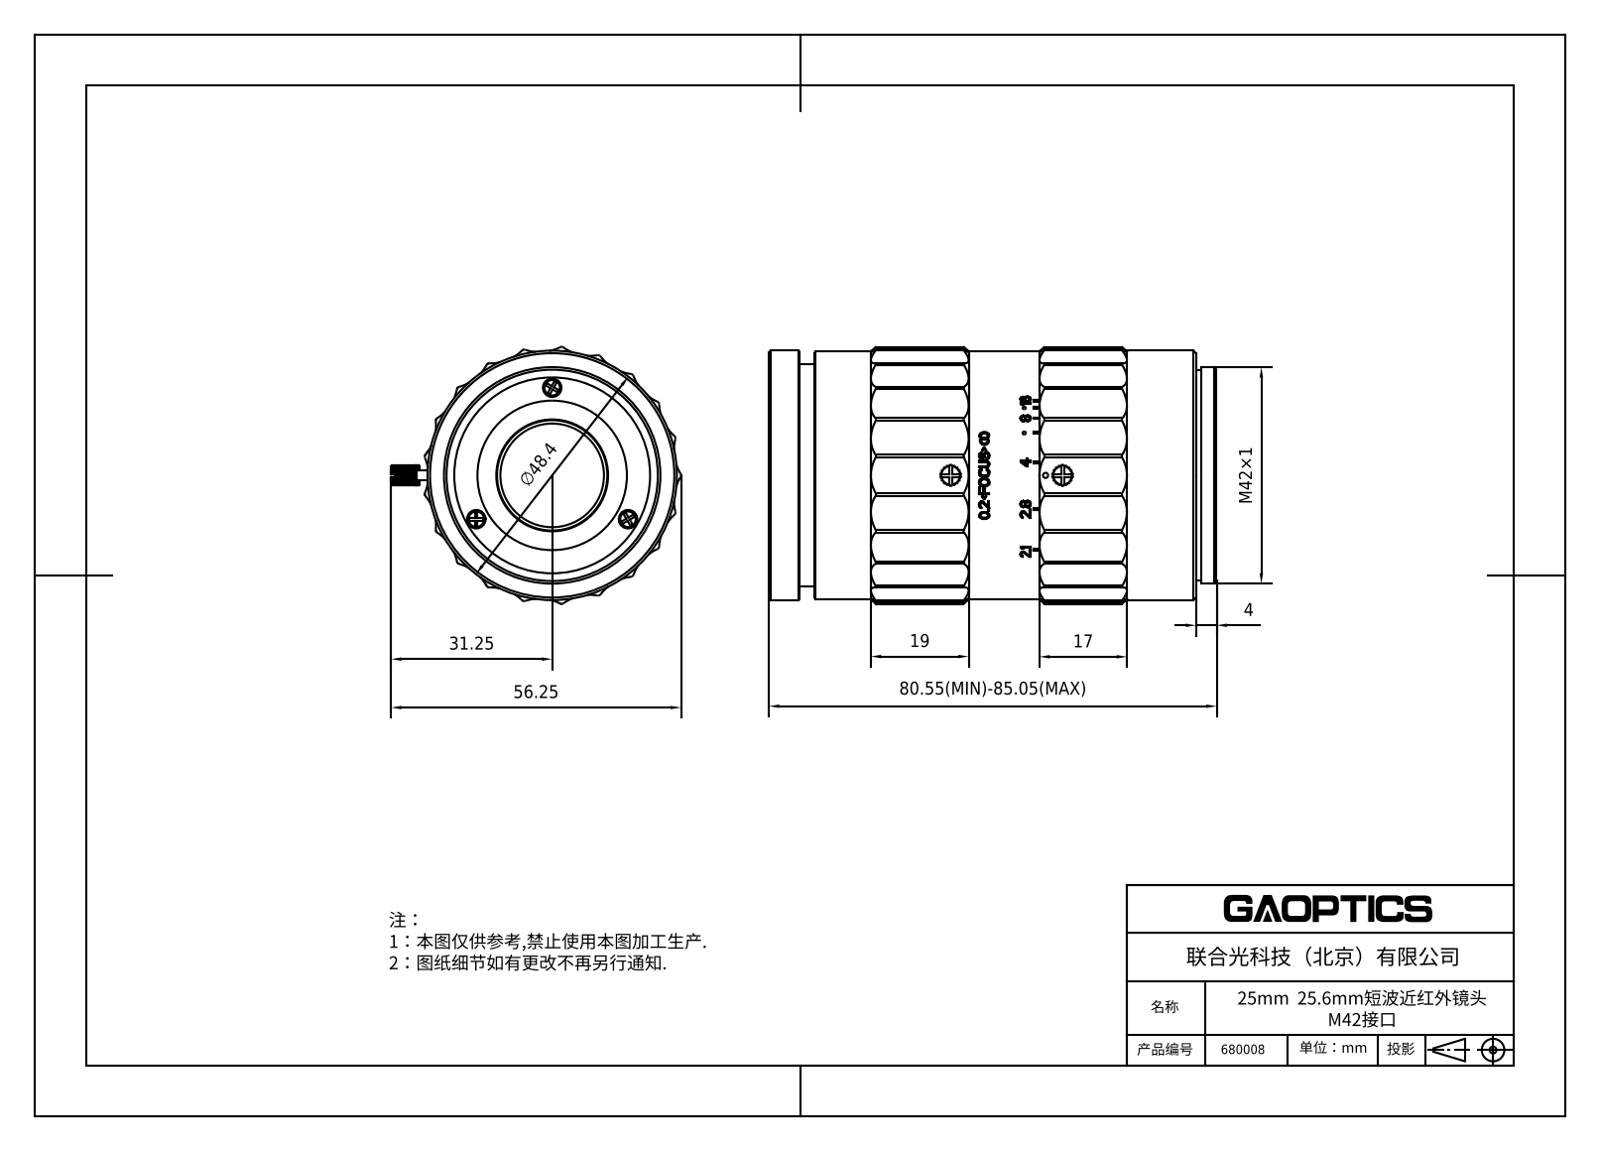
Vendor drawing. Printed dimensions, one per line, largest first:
80.55(MIN)-85.05(MAX)
56.25
∅48.4
M42×1
31.25
19
17
4
